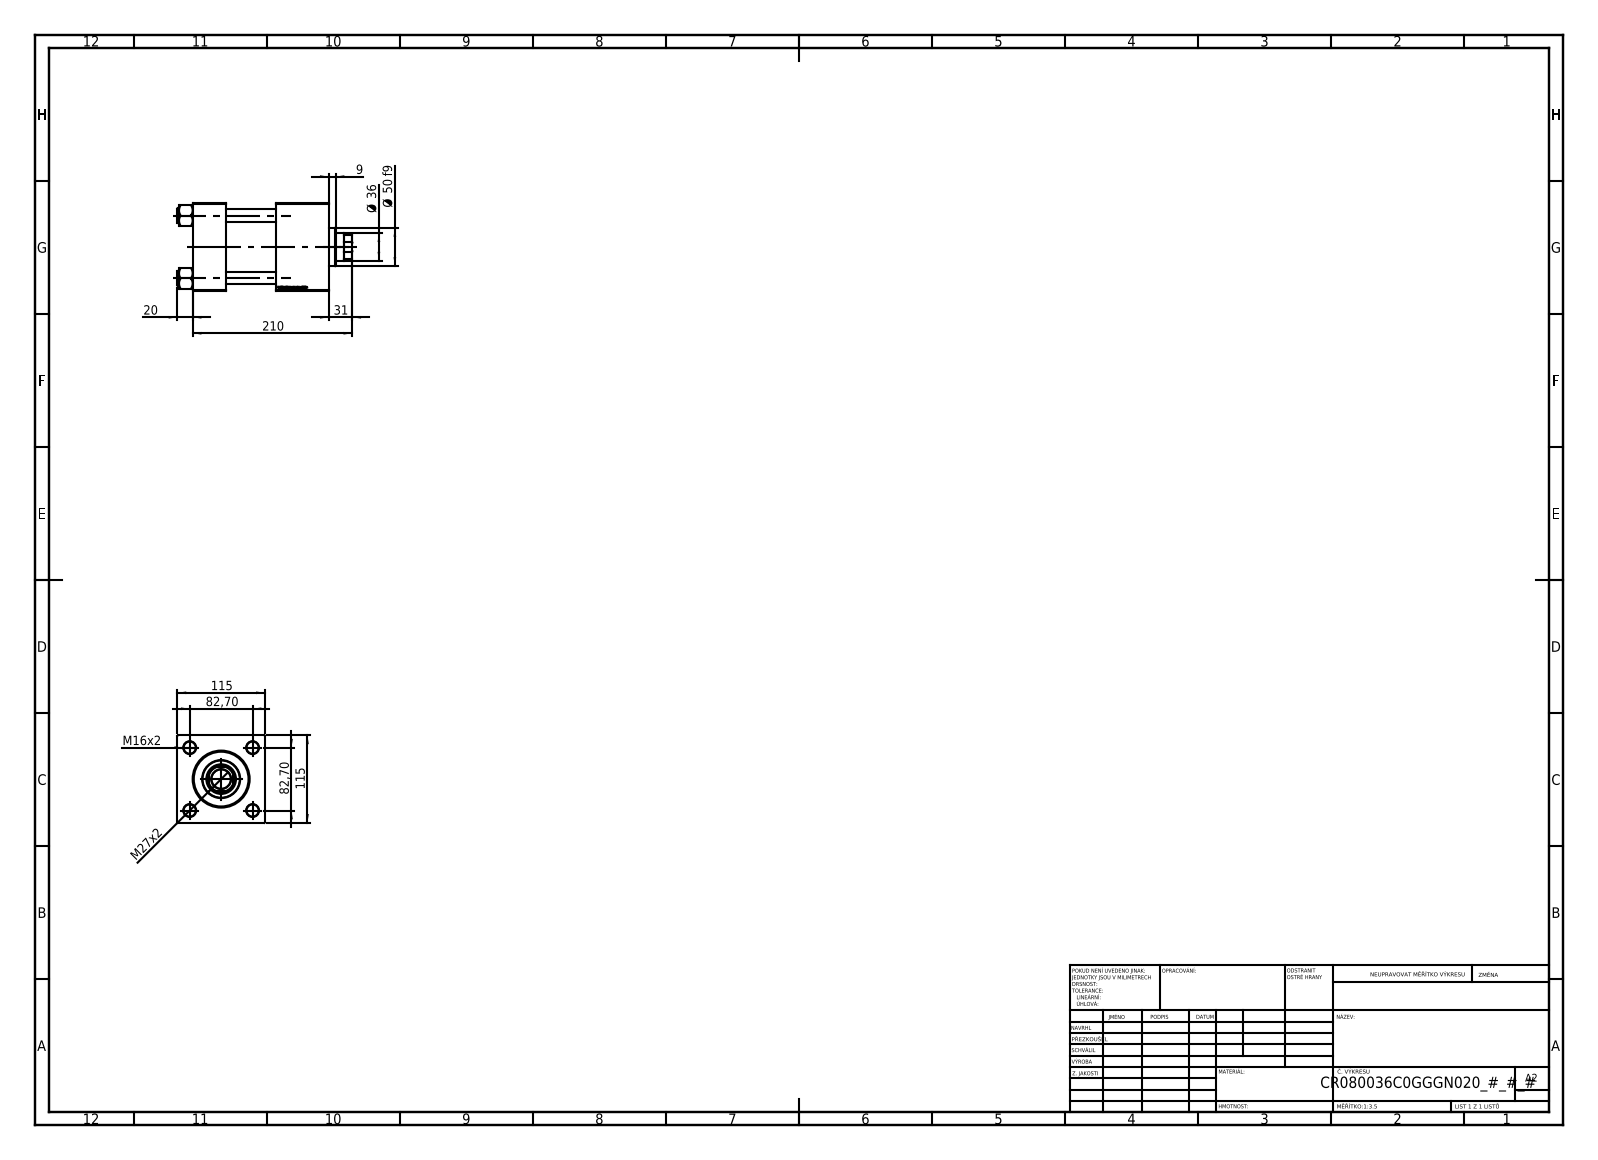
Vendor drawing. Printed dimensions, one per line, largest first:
210
115
115
82,70
82,70
Ø 50 f9
Ø 36
31
M27x2
20
M16x2
9
